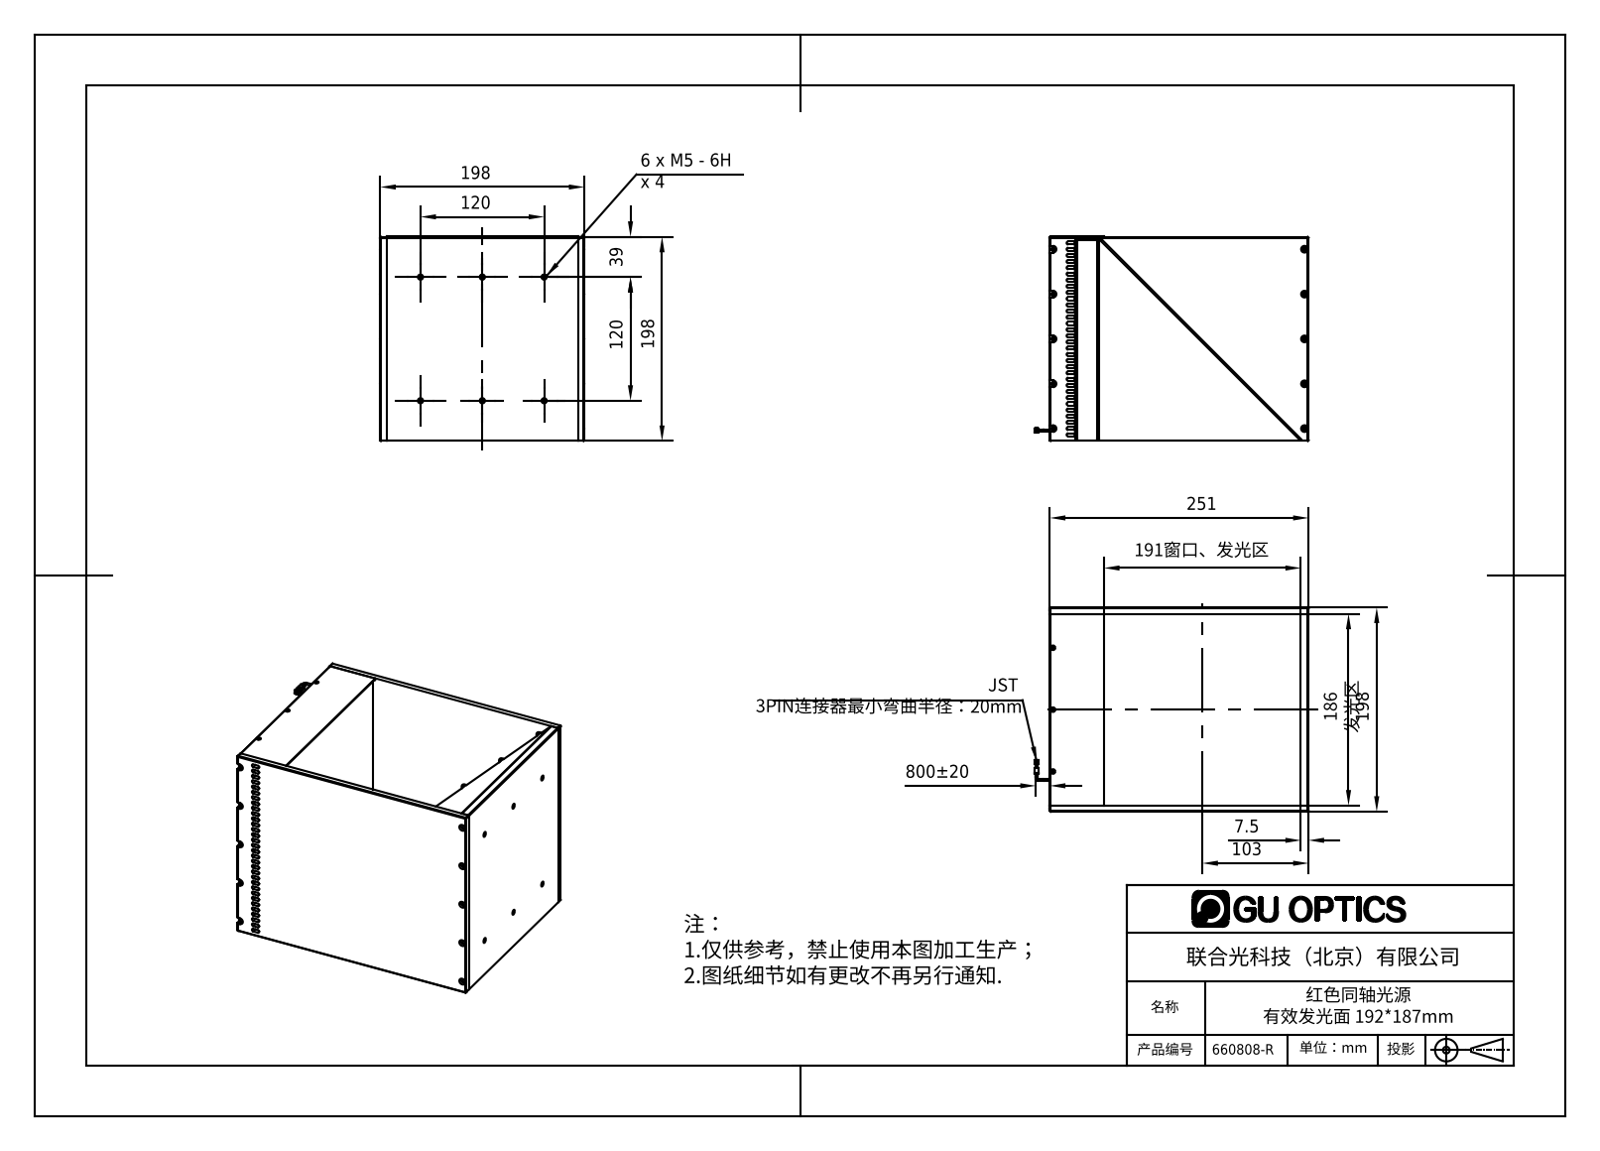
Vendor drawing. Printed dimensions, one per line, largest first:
800±20
251
198
198
198
191窗口、发光区
186 发光区
120
120
103
39
7.5
